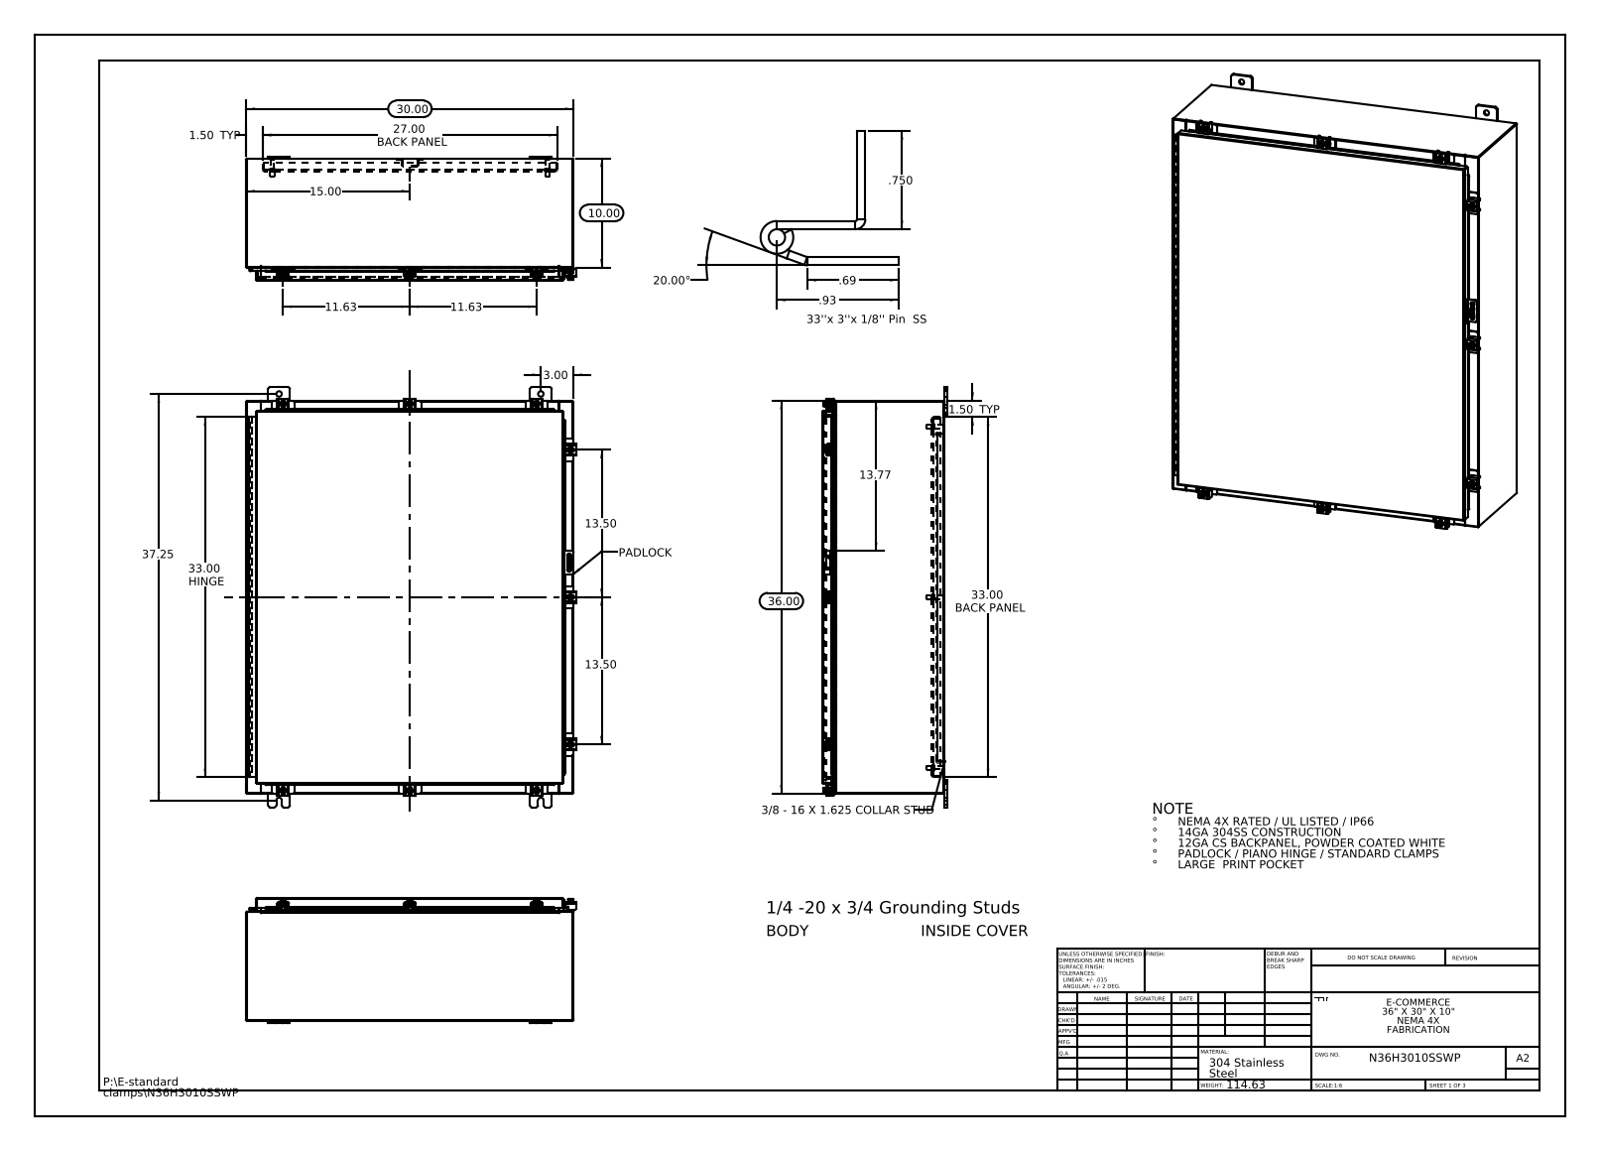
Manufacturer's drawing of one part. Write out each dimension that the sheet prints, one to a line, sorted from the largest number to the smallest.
37.25
36.00
33.00 HINGE
33.00 BACK PANEL
30.00
27.00 BACK PANEL
20.00°
15.00
13.77
13.50
13.50
11.63
11.63
10.00
3.00
1.50 TYP
1.50 TYP
.93
.750
.69
